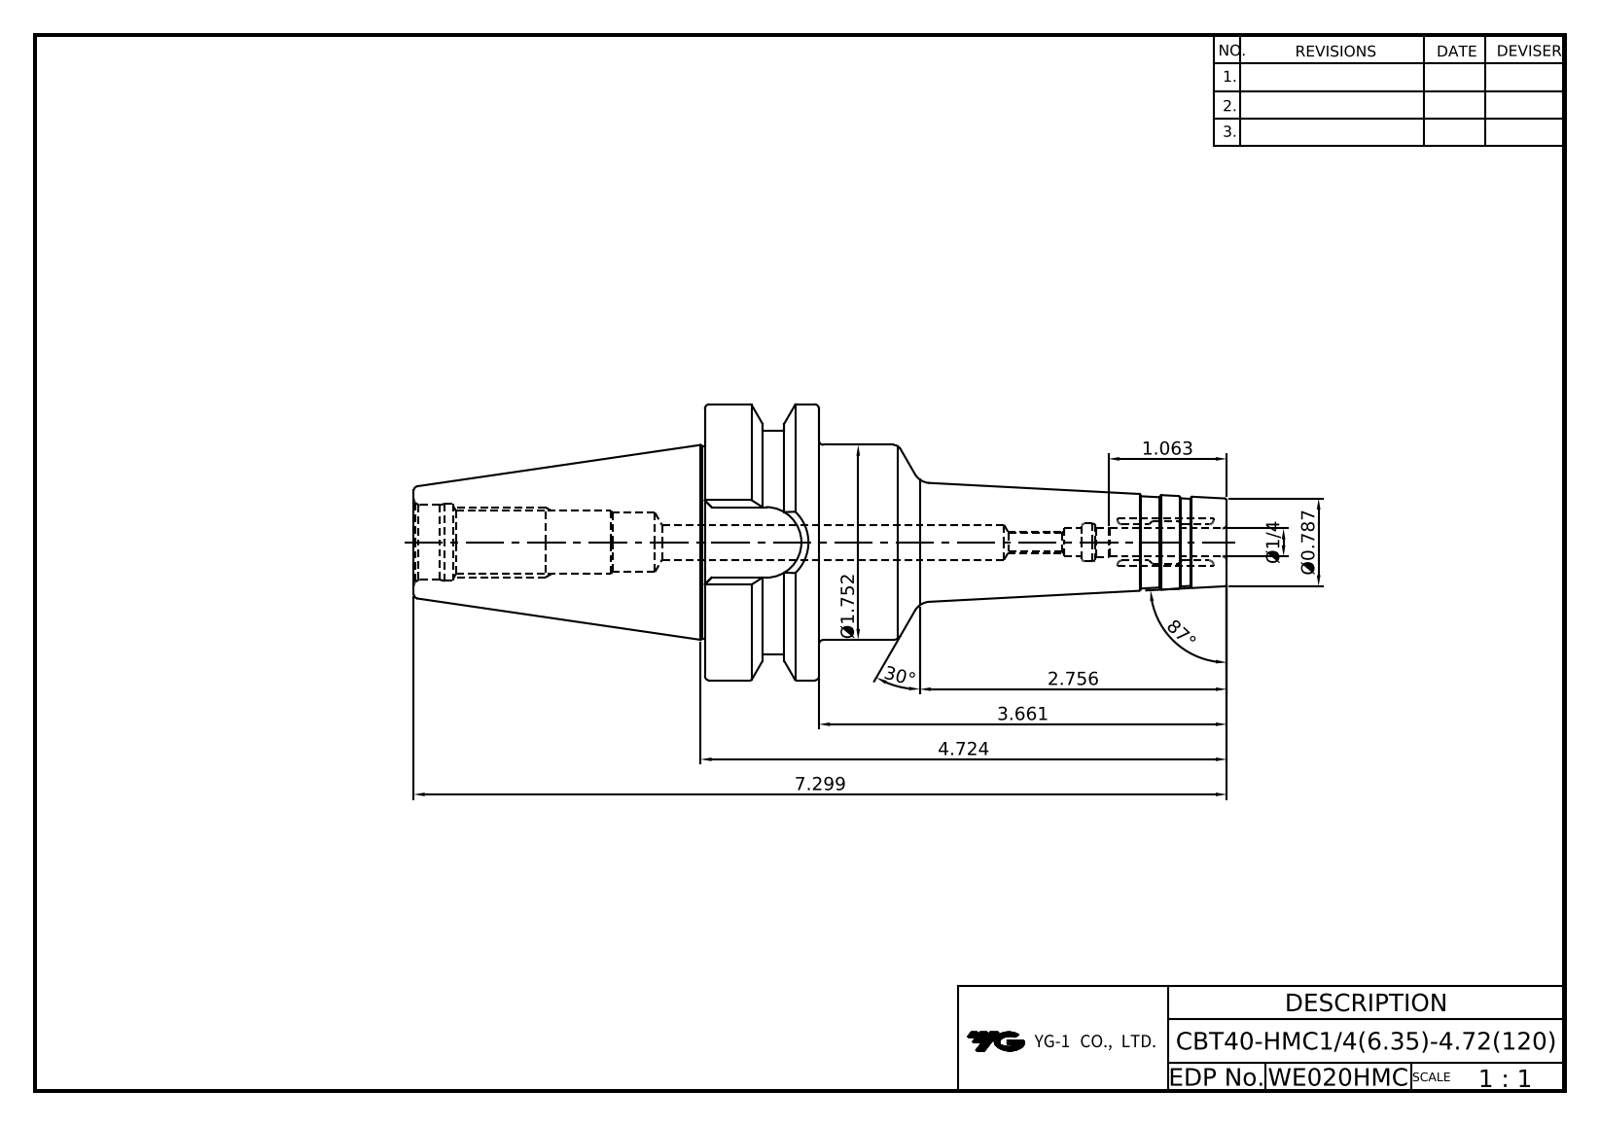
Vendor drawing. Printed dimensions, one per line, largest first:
87°
30°
7.299
4.724
3.661
2.756
Ø1.752
1.063
Ø0.787
Ø1/4
